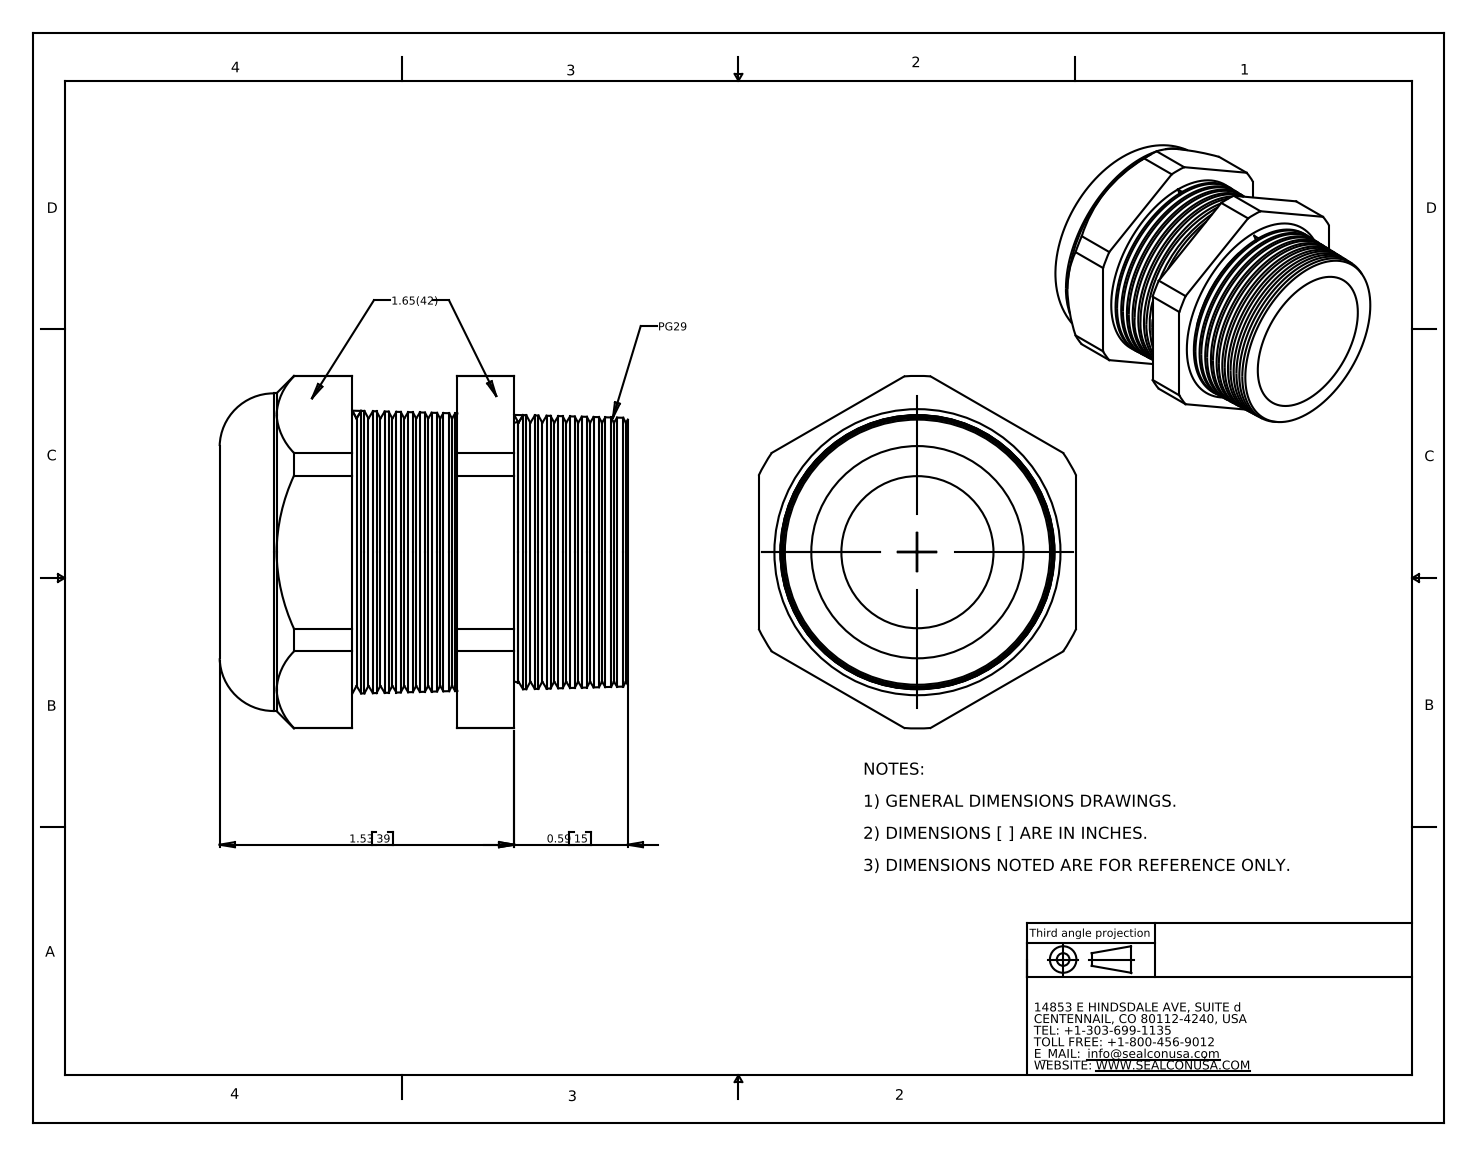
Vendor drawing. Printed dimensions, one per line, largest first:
1.53 39
0.59 15
